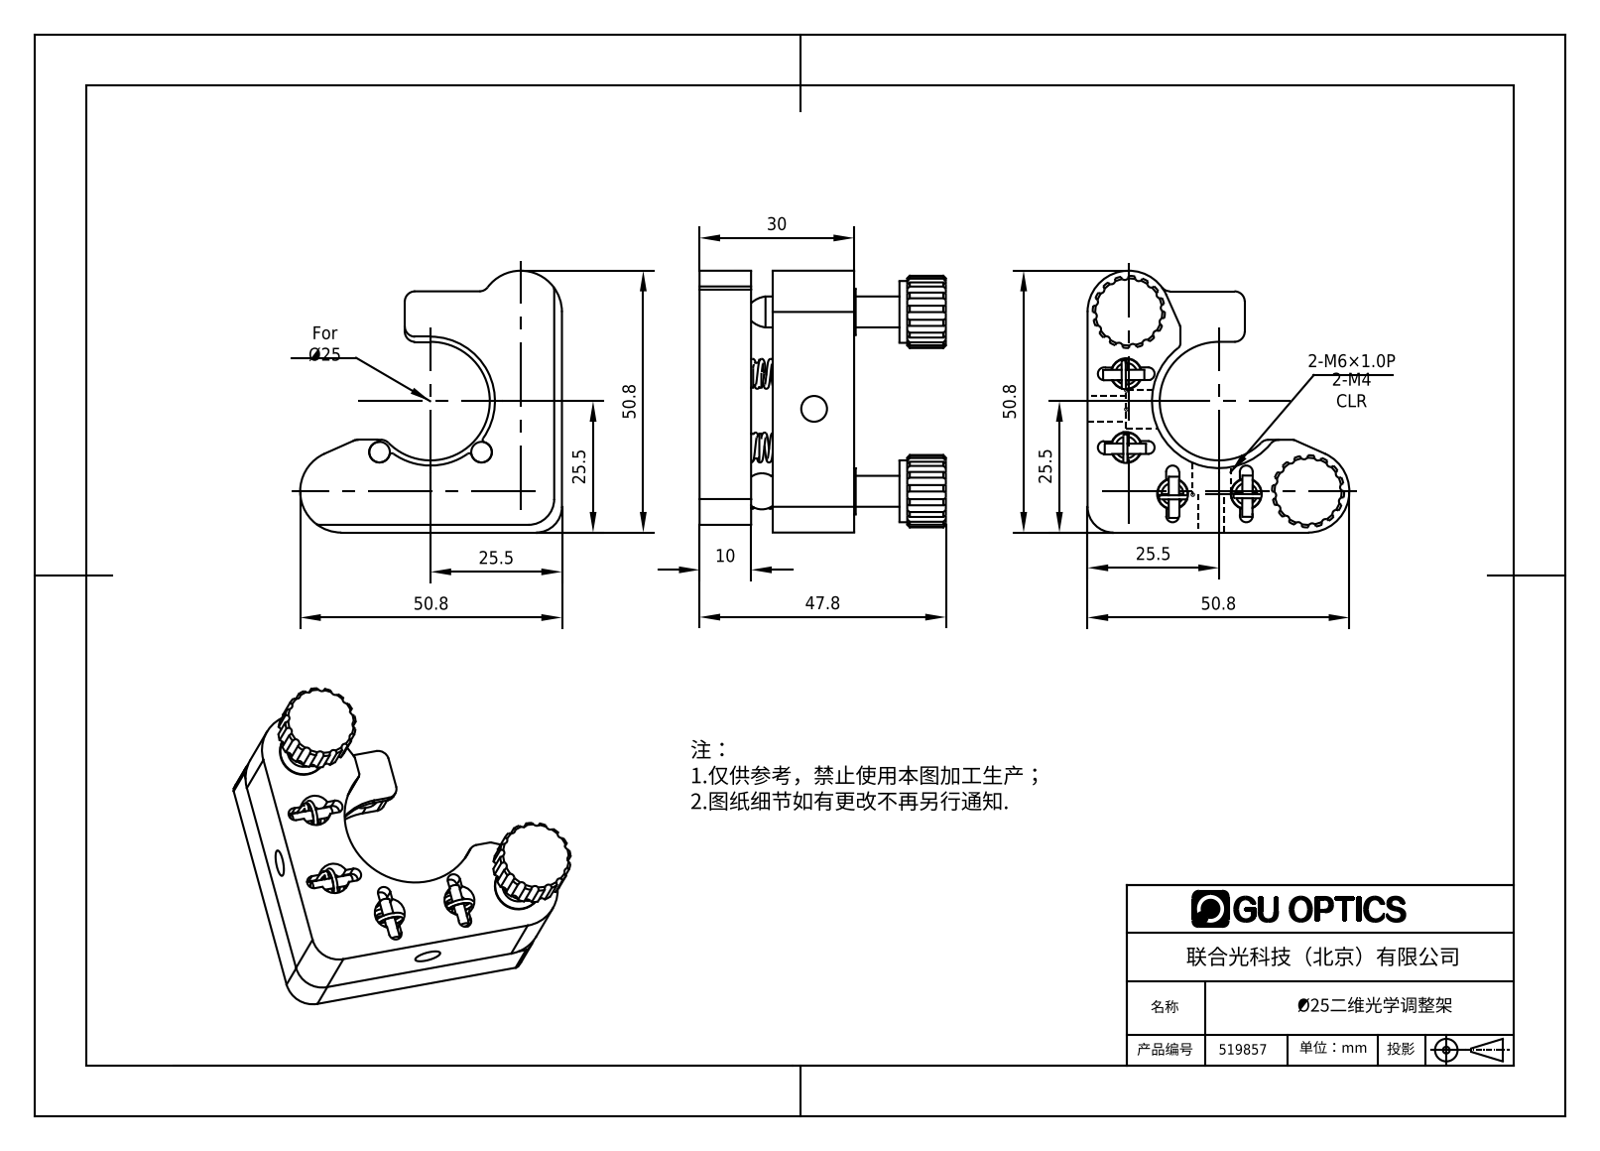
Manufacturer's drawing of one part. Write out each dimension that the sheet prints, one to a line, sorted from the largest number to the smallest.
50.8
50.8
50.8
50.8
47.8
30
25.5
25.5
25.5
25.5
10
